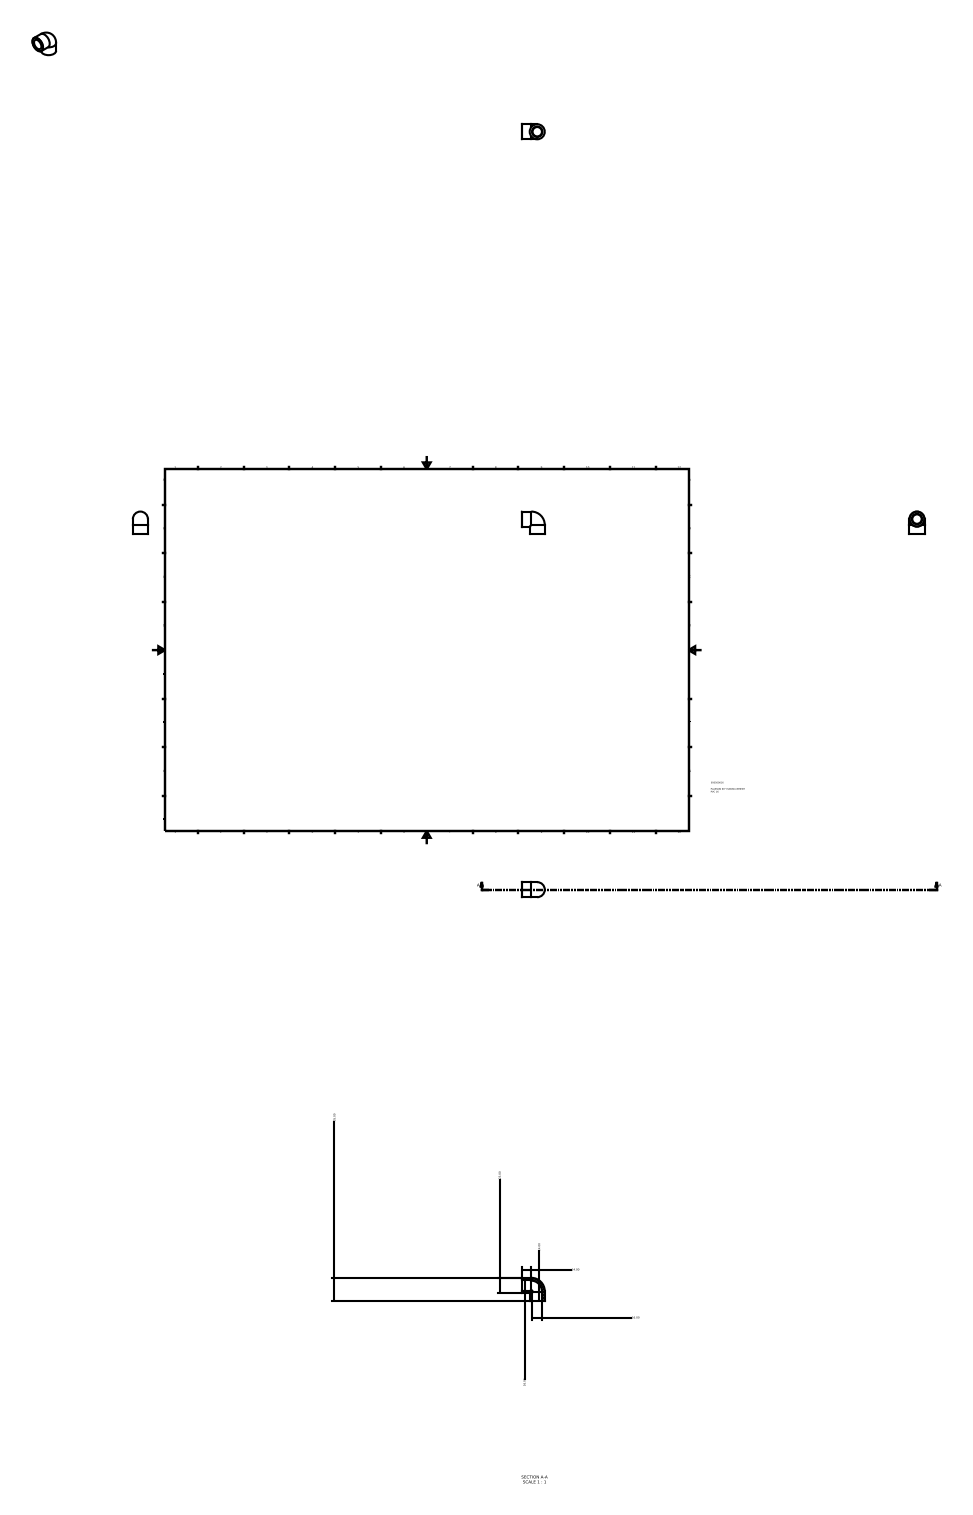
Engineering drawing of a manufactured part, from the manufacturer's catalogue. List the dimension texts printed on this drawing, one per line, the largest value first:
35.00
23.00
16.00
16.00
14.00
14.00
